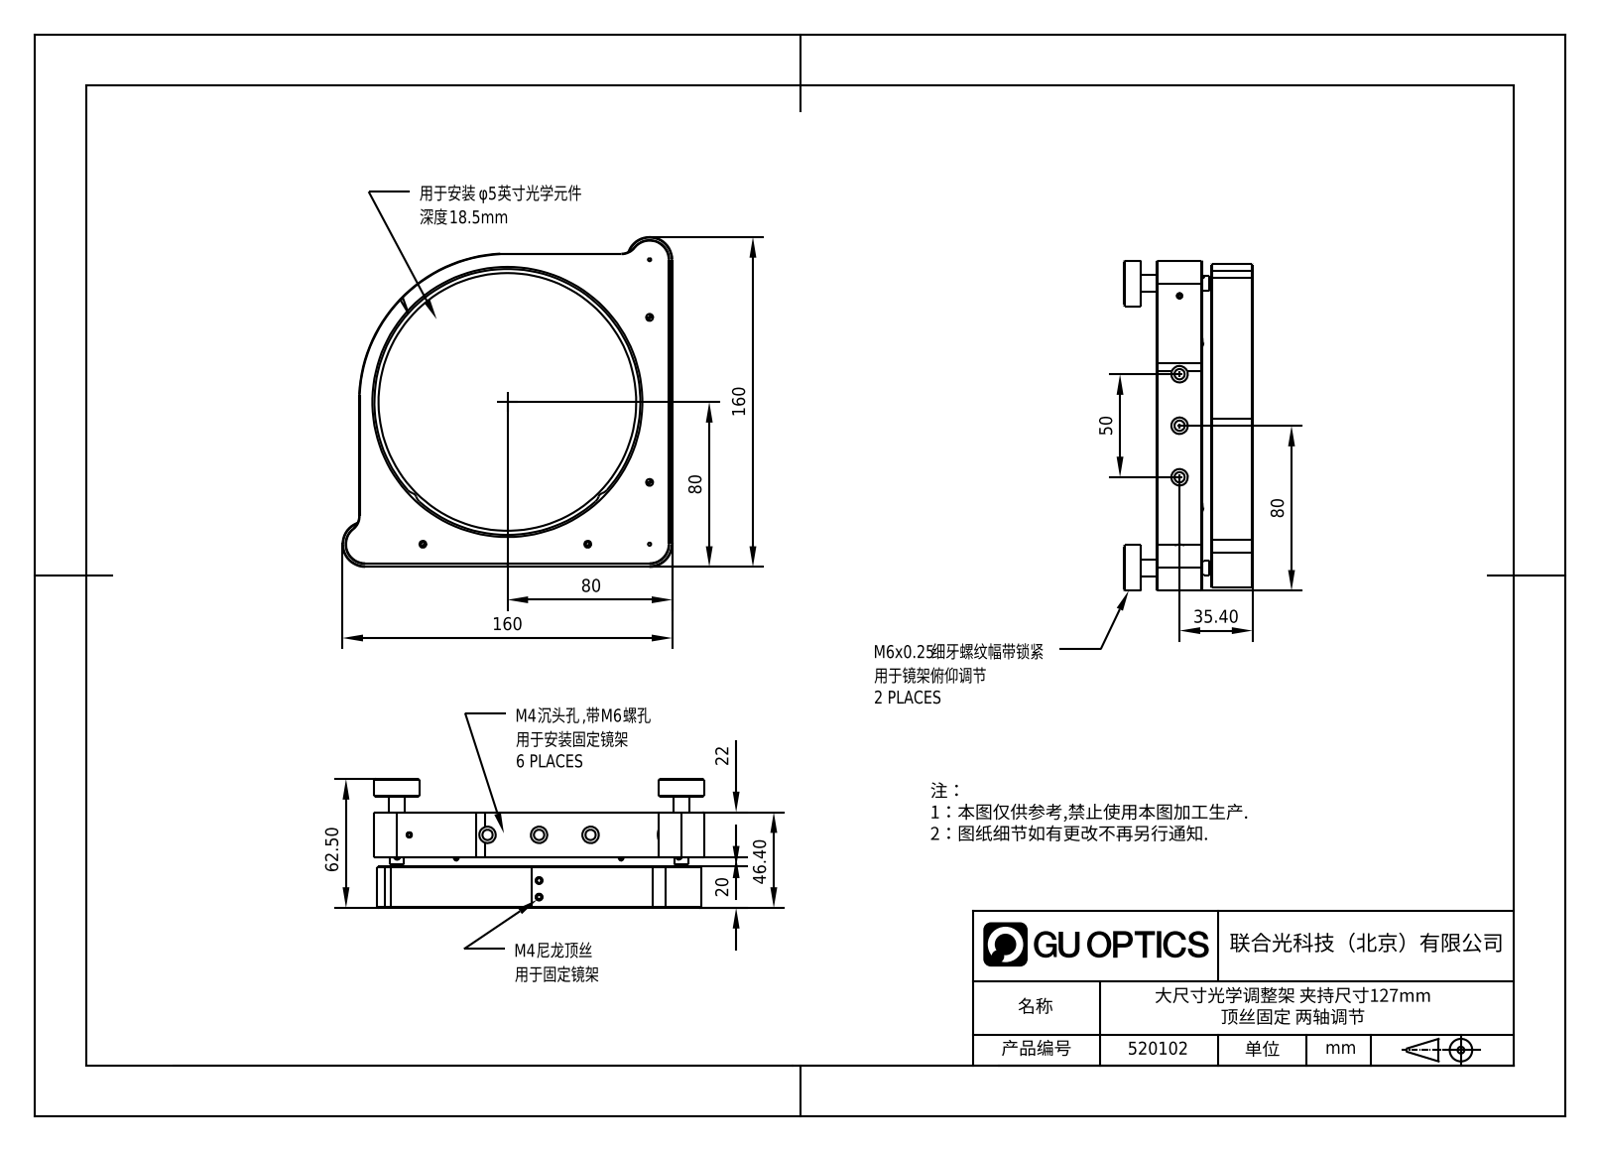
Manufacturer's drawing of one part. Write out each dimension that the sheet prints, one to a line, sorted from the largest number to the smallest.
160
160
80
80
80
62.50
50
46.40
35.40
22
20
